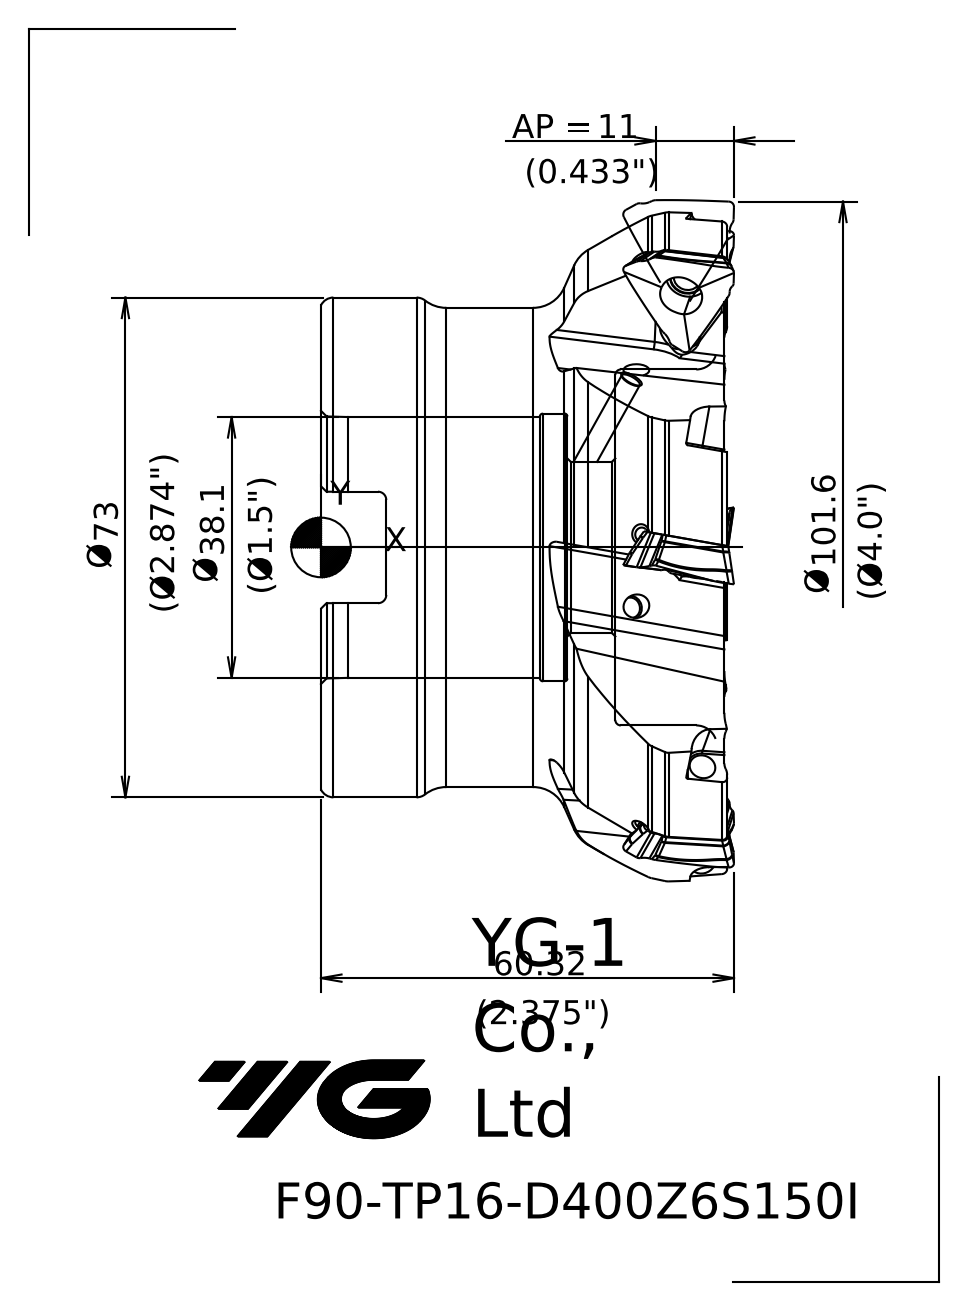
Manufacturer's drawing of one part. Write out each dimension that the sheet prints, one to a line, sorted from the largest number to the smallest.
101.6 Ø
60.32
38.1 Ø
AP = 11
